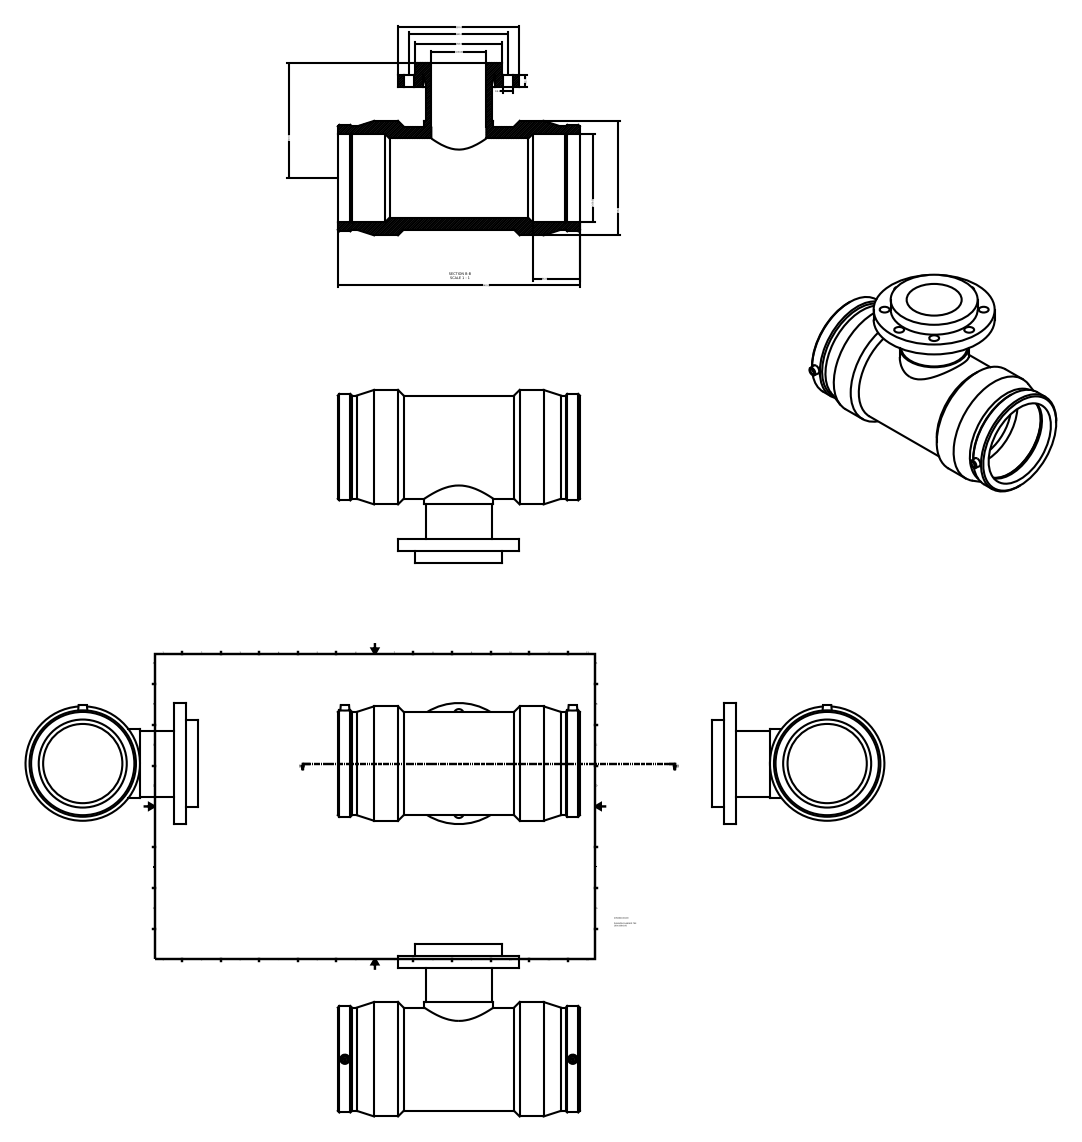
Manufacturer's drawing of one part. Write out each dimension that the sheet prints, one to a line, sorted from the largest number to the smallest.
440.00
220.00
210.00
208.00
180.00
n160.00
158.00
n100.00
86.00
22.00
18.00
